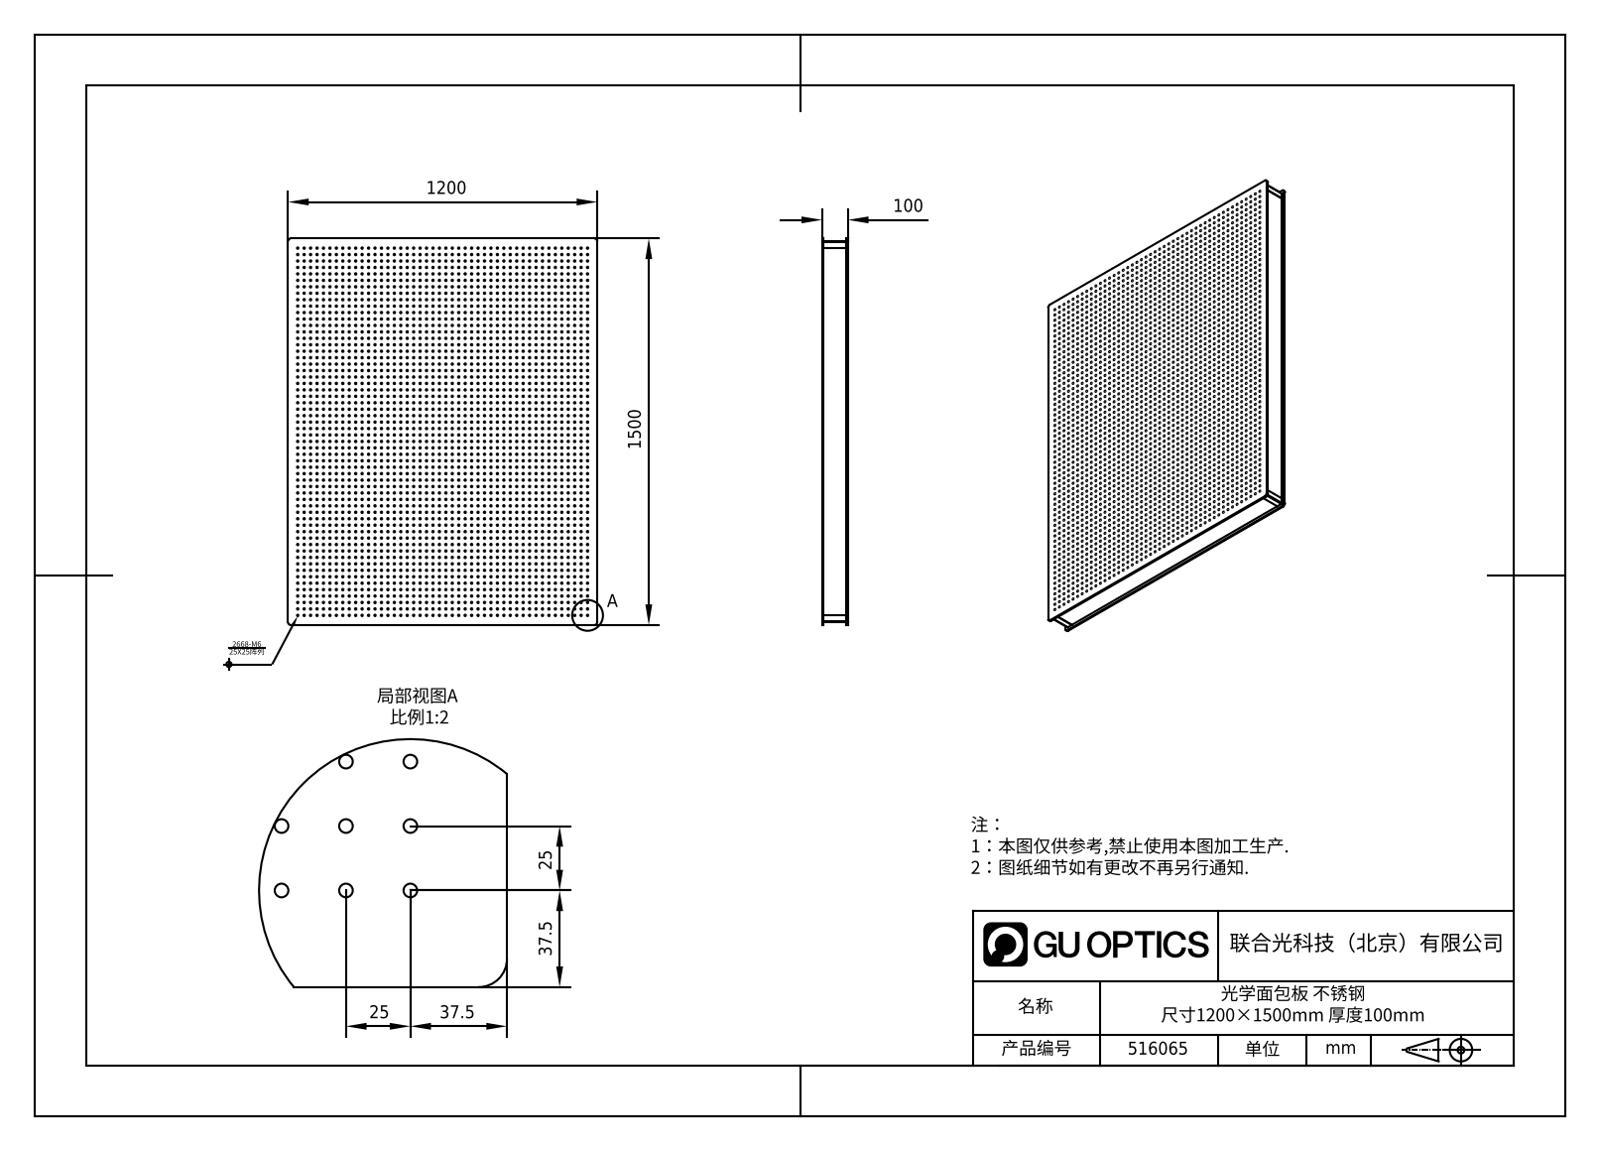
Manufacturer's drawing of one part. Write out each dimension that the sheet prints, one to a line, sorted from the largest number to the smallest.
1500
1200
100
37.5
37.5
25
25
